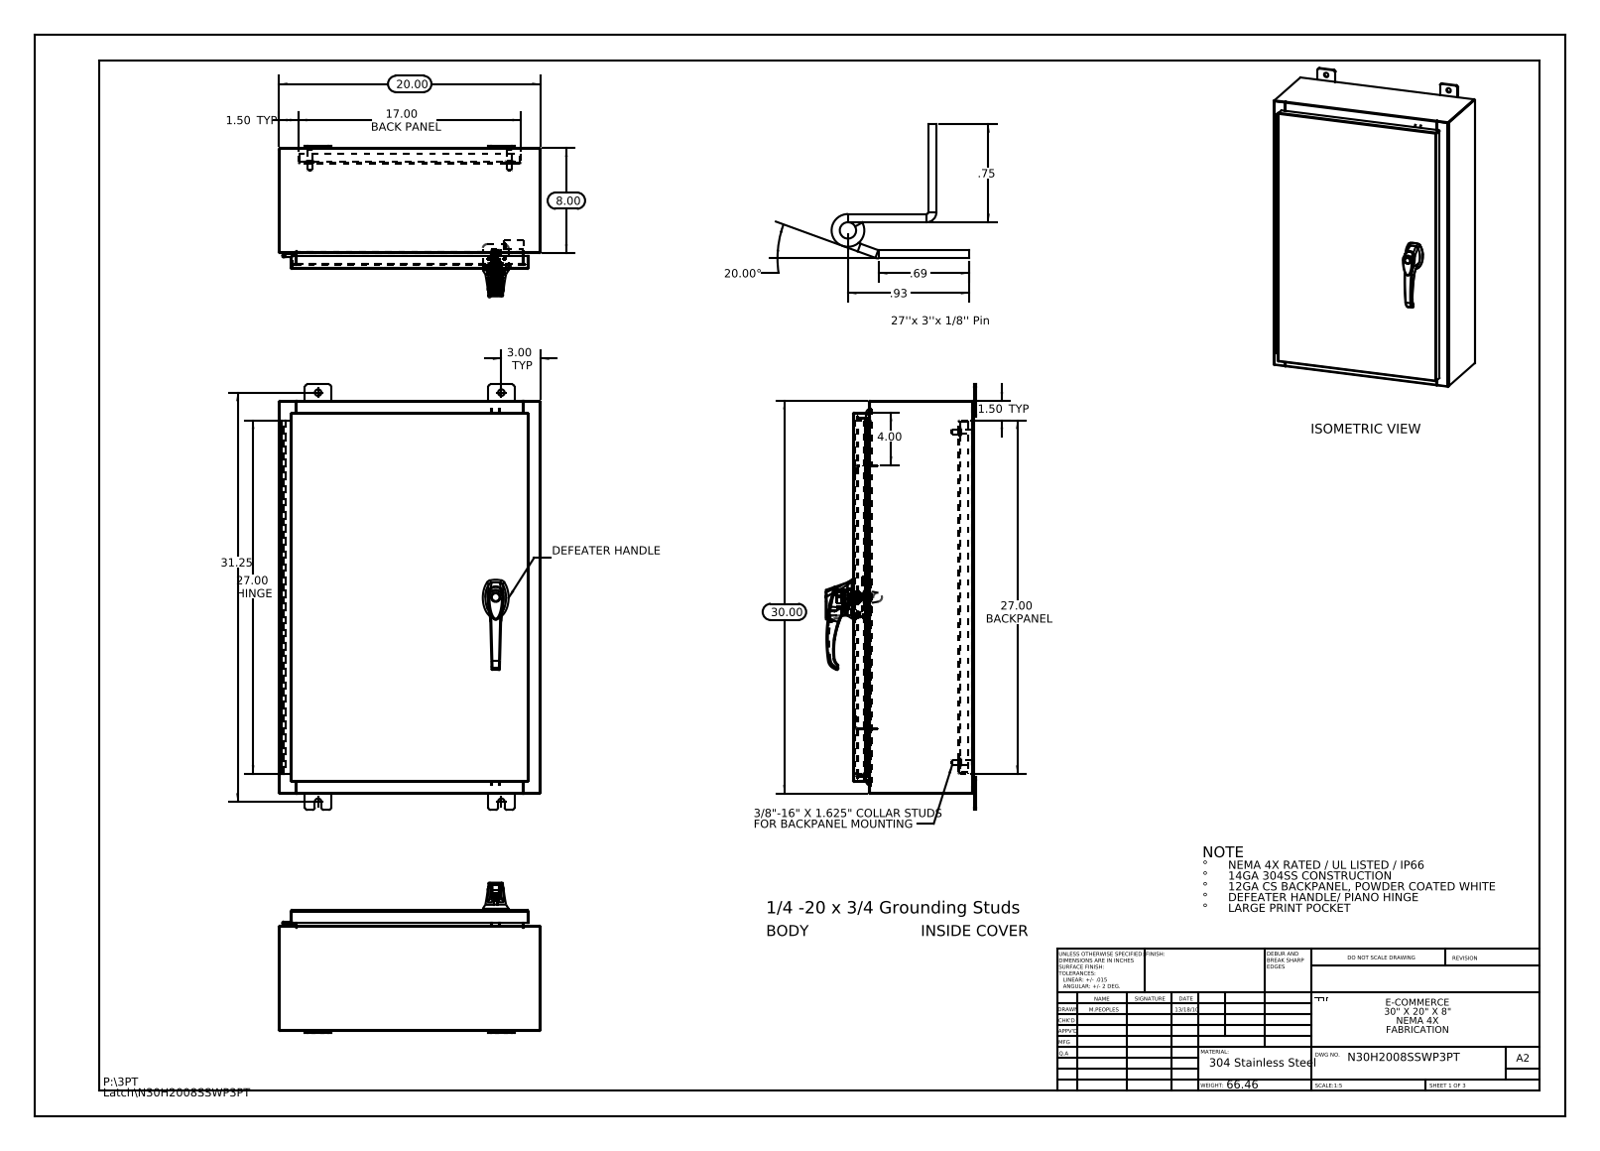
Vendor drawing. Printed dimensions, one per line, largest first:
31.25
30.00
27.00 HINGE
27.00 BACKPANEL
20.00
20.00°
17.00 BACK PANEL
8.00
4.00
3.00 TYP
1.50 TYP
1.50 TYP
.93
.75
.69
